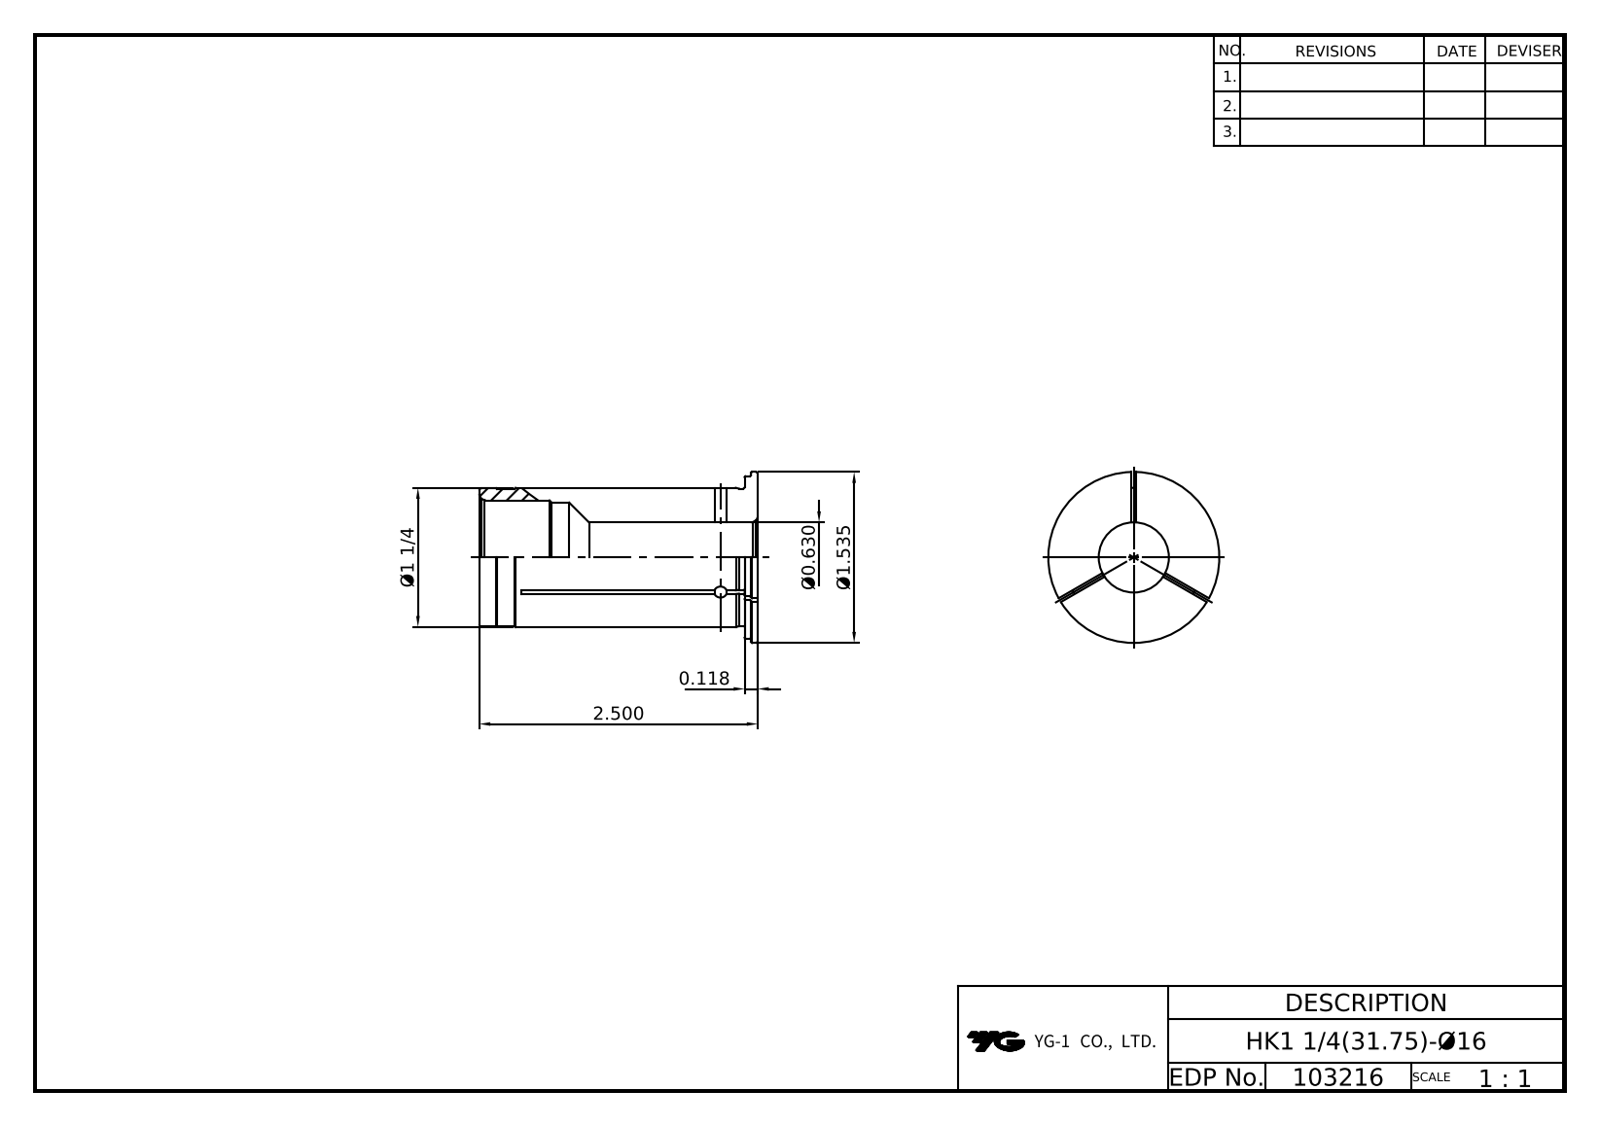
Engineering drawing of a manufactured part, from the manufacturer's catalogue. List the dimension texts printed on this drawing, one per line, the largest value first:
2.500
Ø1.535
Ø1 1/4
0.118
